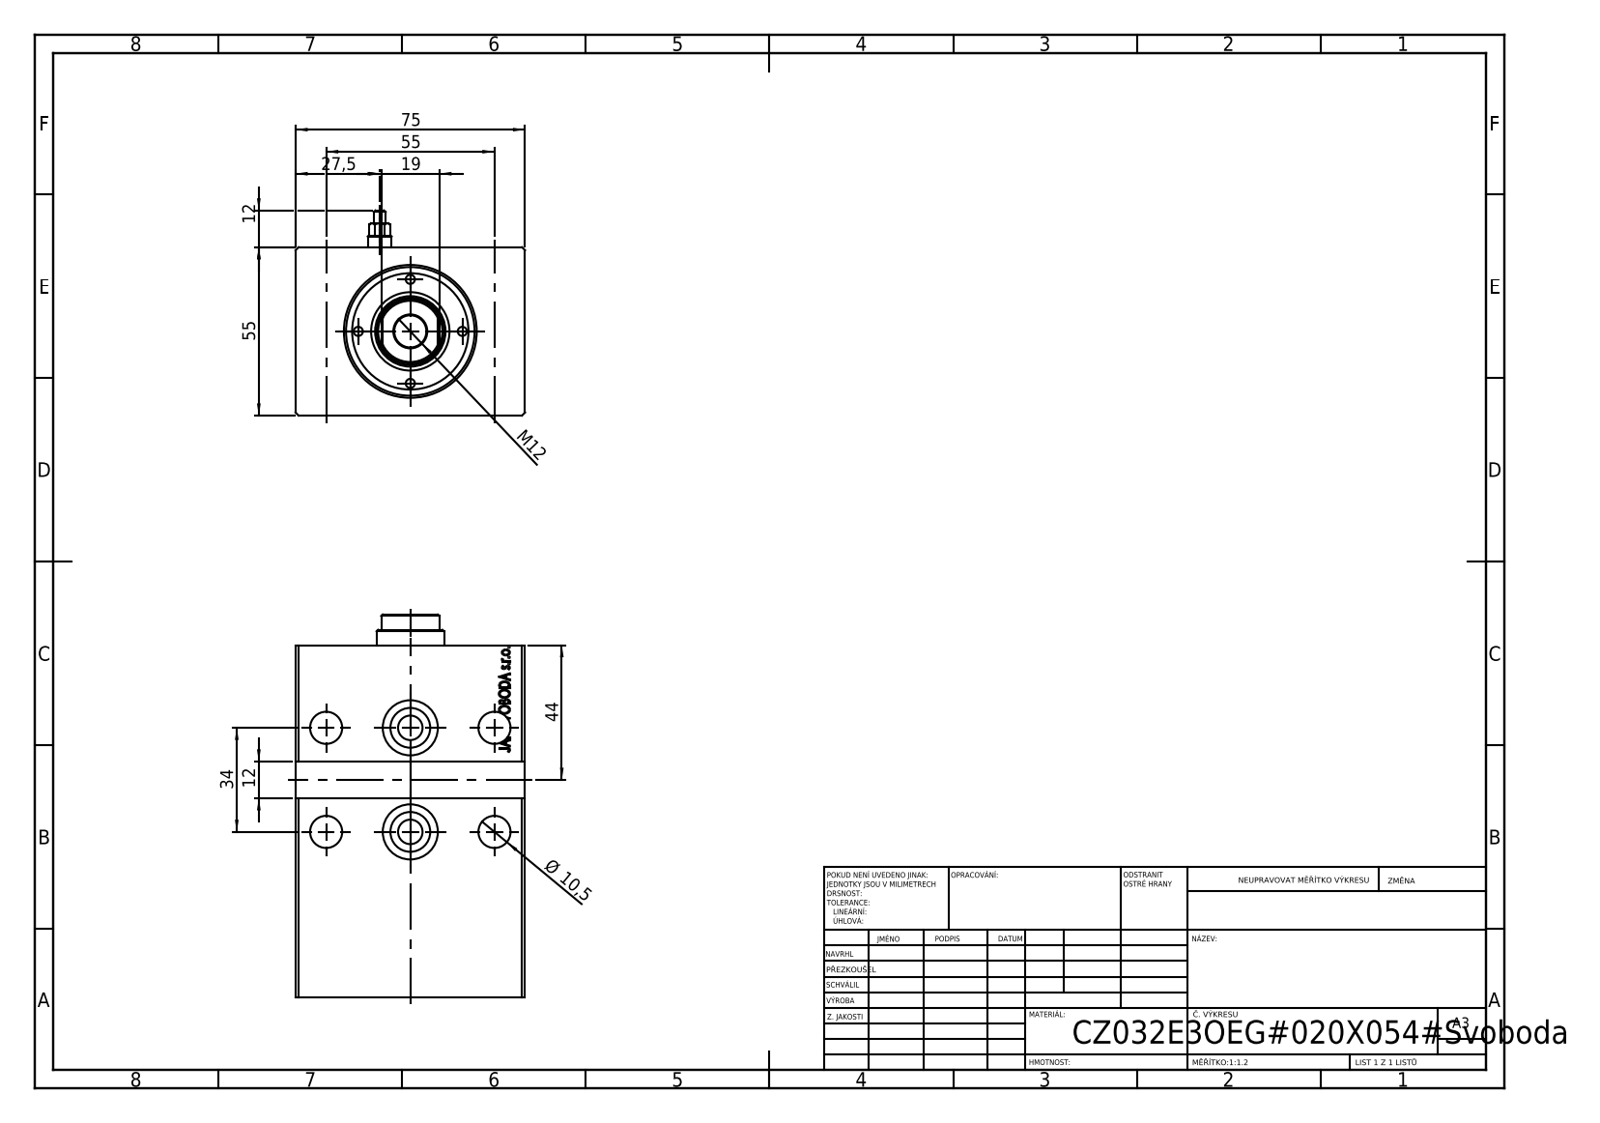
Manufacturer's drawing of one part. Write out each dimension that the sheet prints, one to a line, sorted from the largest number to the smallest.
75
55
55
44
34
27,5
19
M12
12
12
Ø 10,5
